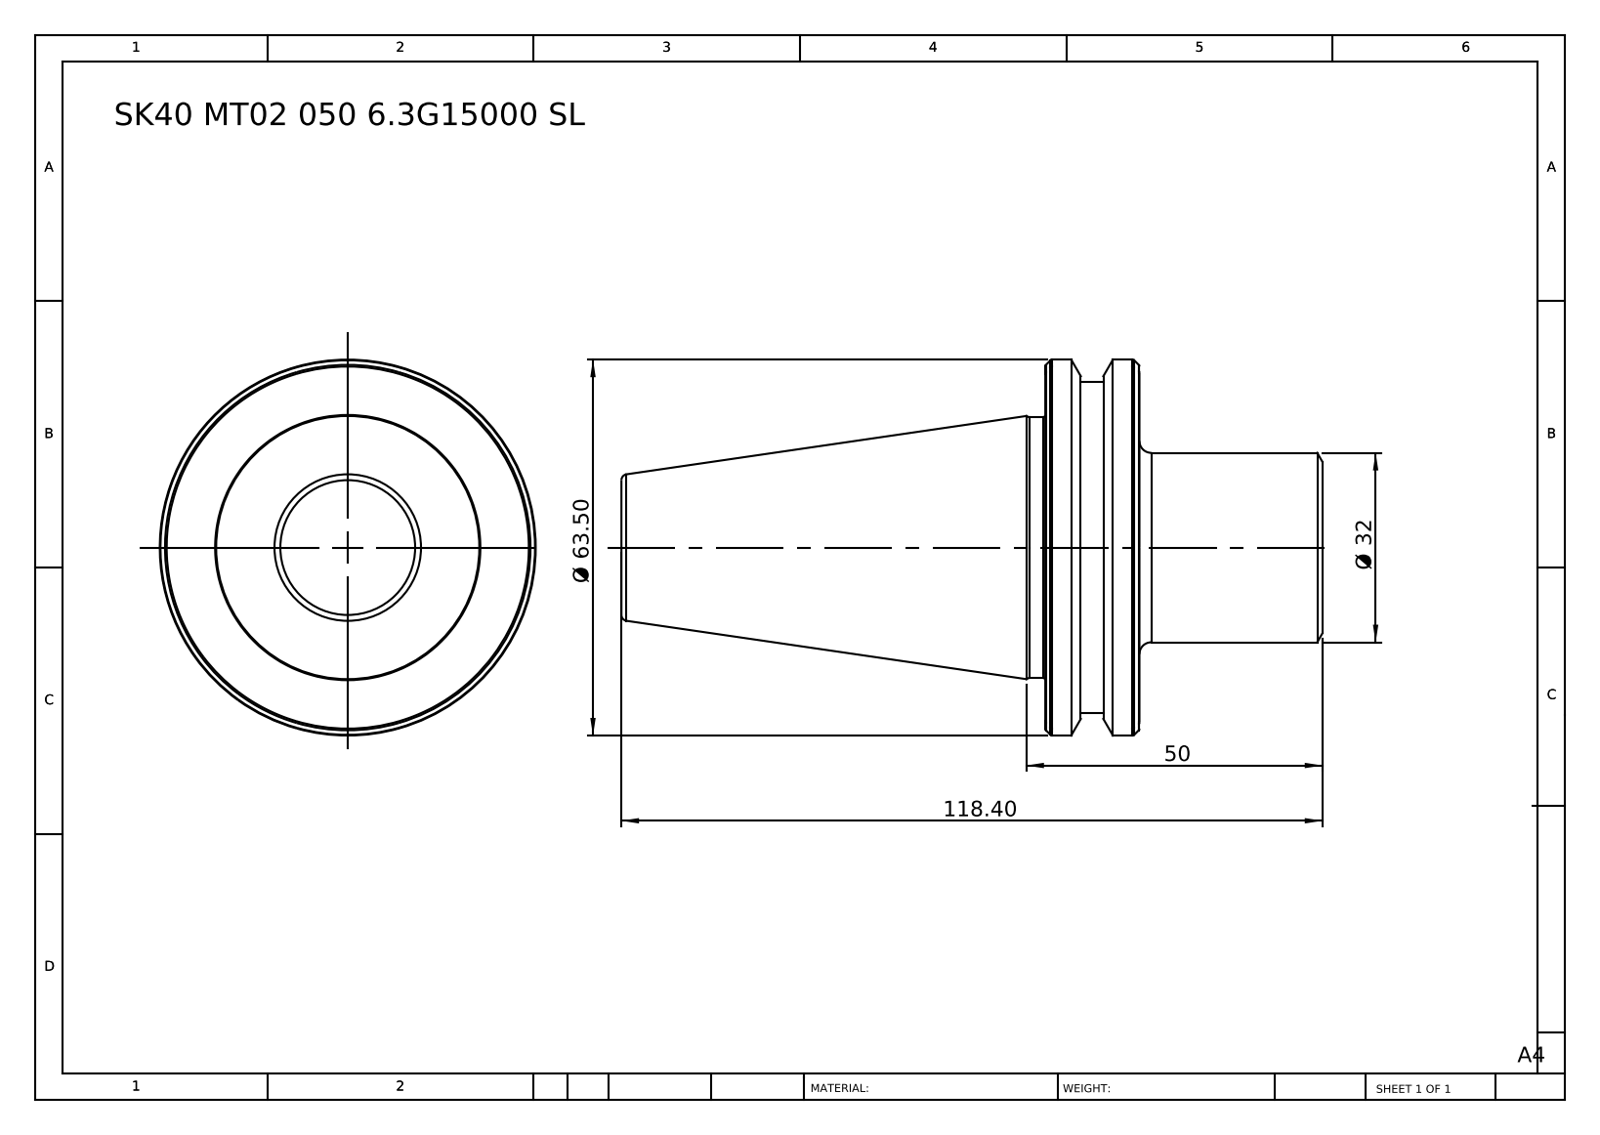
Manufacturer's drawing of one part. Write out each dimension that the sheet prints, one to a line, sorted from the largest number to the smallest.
118.40
Ø 63.50
50
Ø 32
